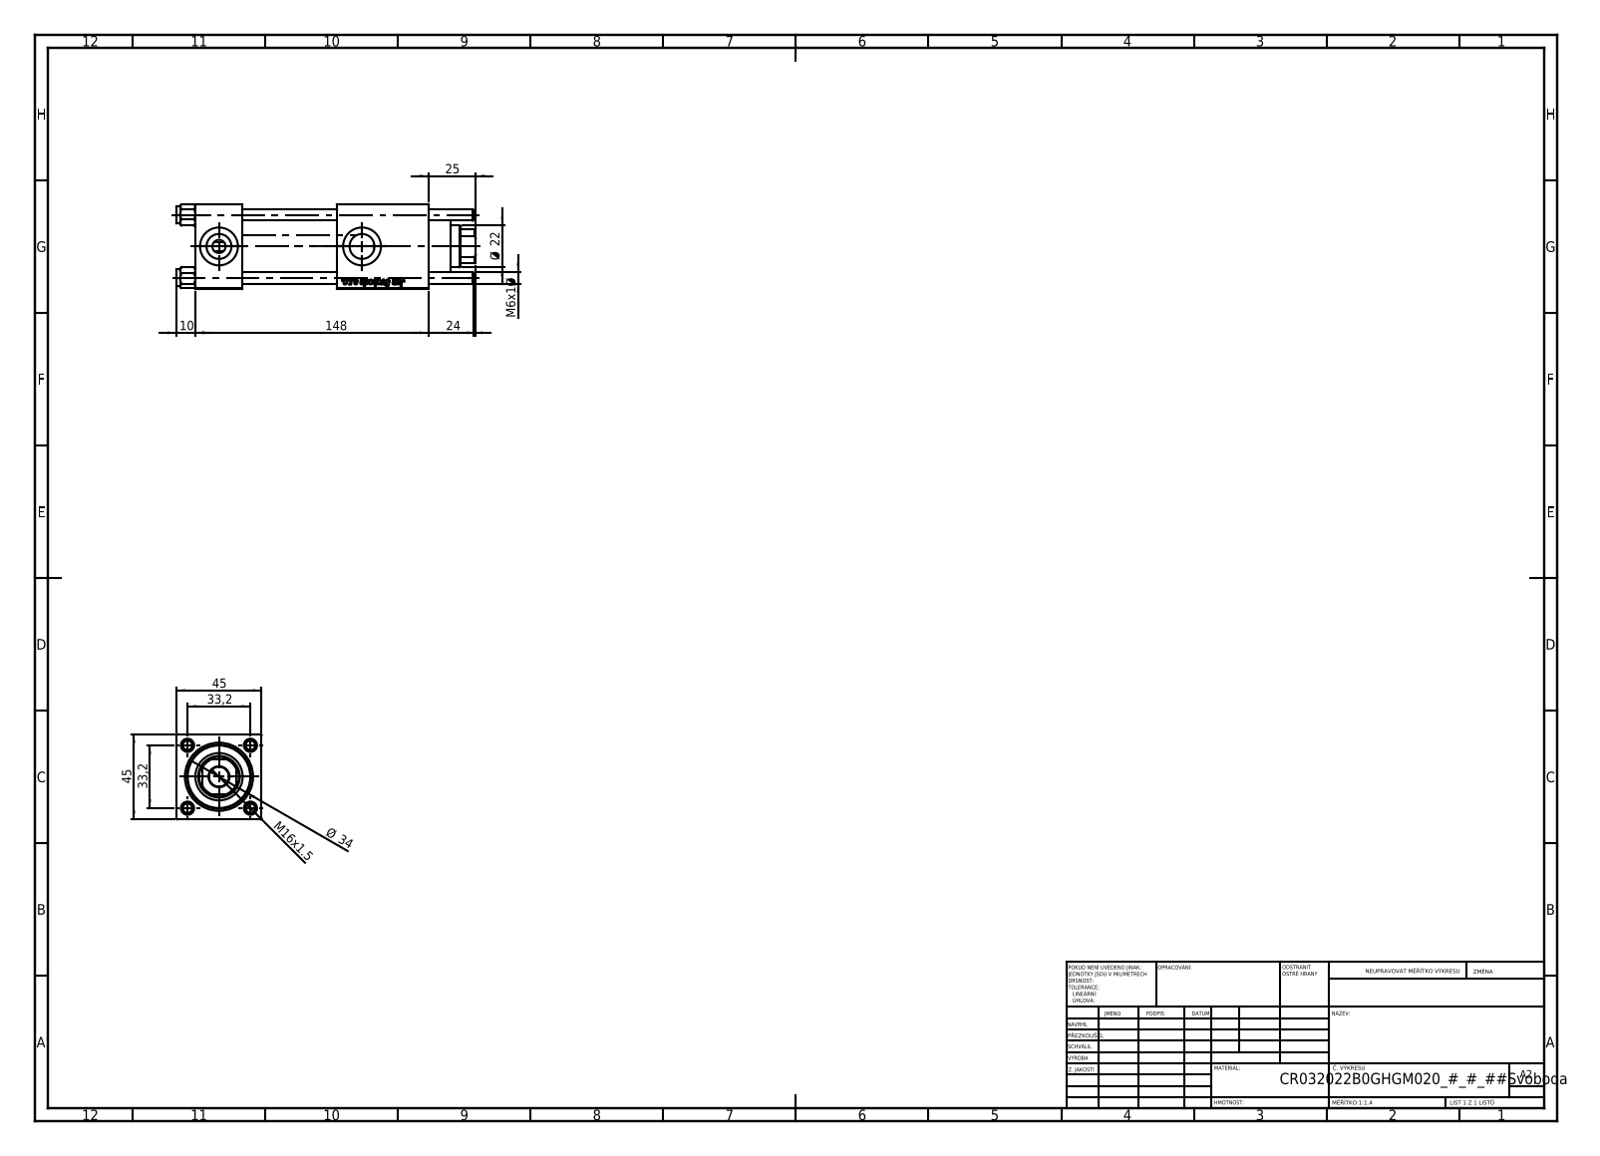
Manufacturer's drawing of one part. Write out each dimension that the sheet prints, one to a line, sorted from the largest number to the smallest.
148
45
45
Ø 34
33,2
33,2
25
24
Ø 22
M16x1.5
10
M6x1 Ø
